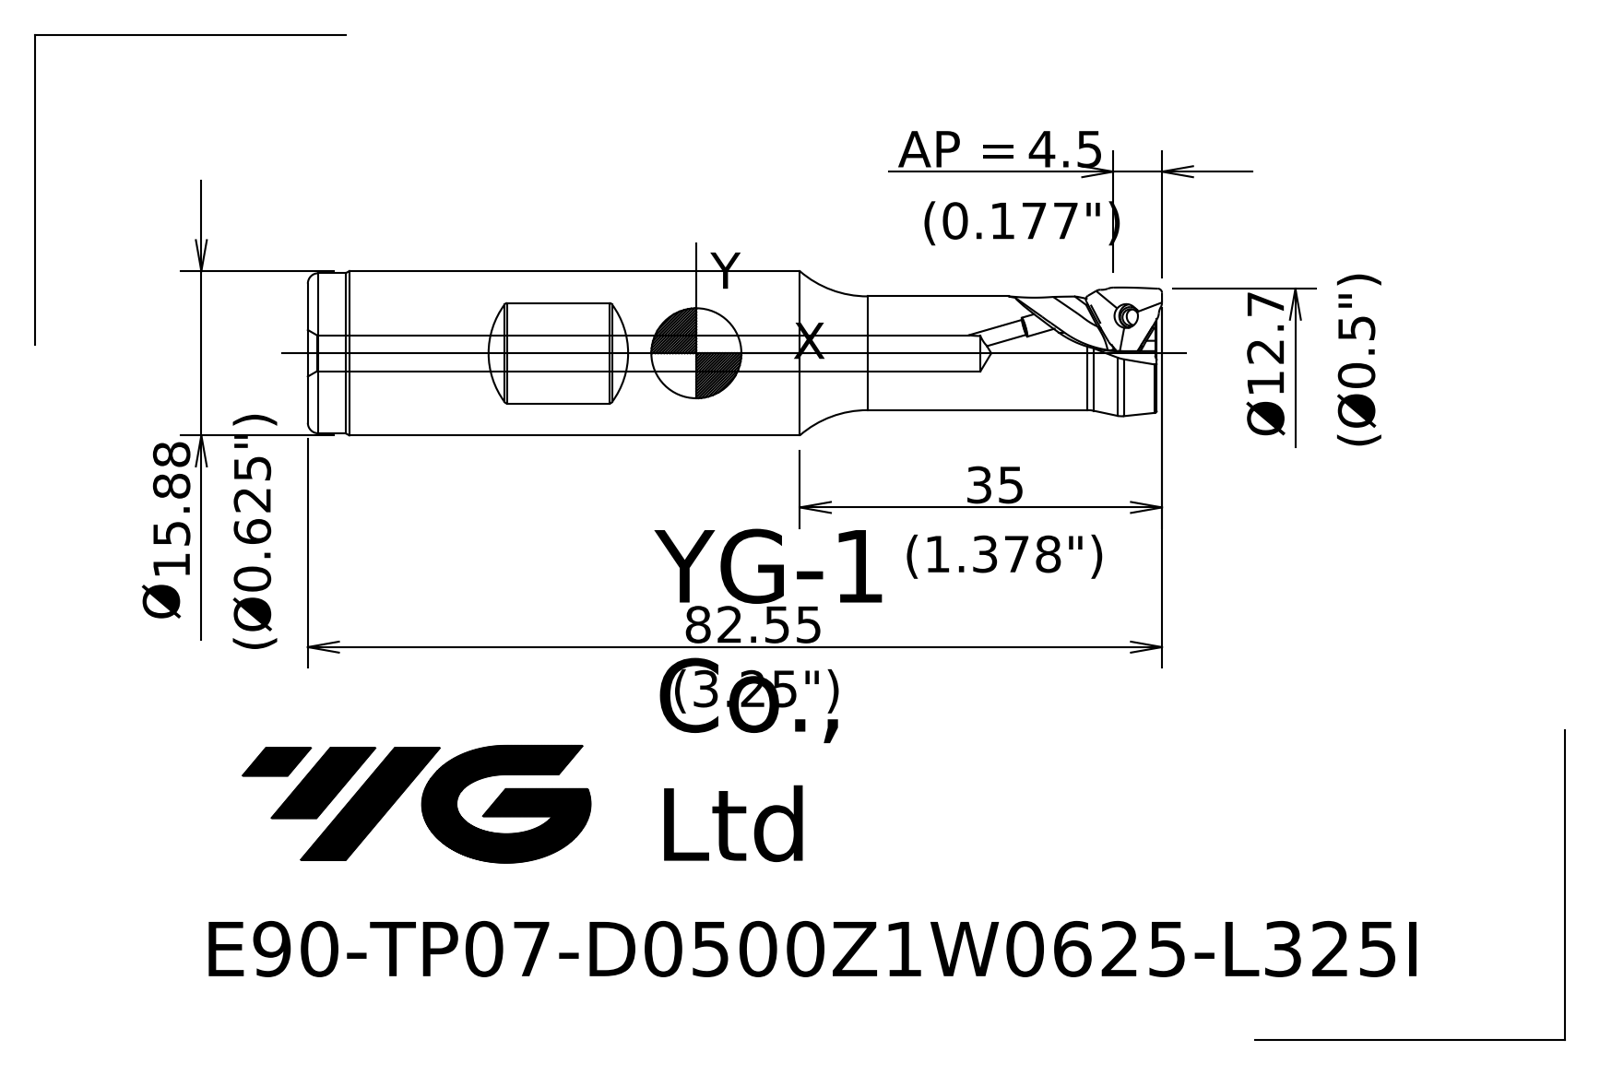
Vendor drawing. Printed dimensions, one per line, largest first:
82.55
35
Ø12.7
4.5 AP =
